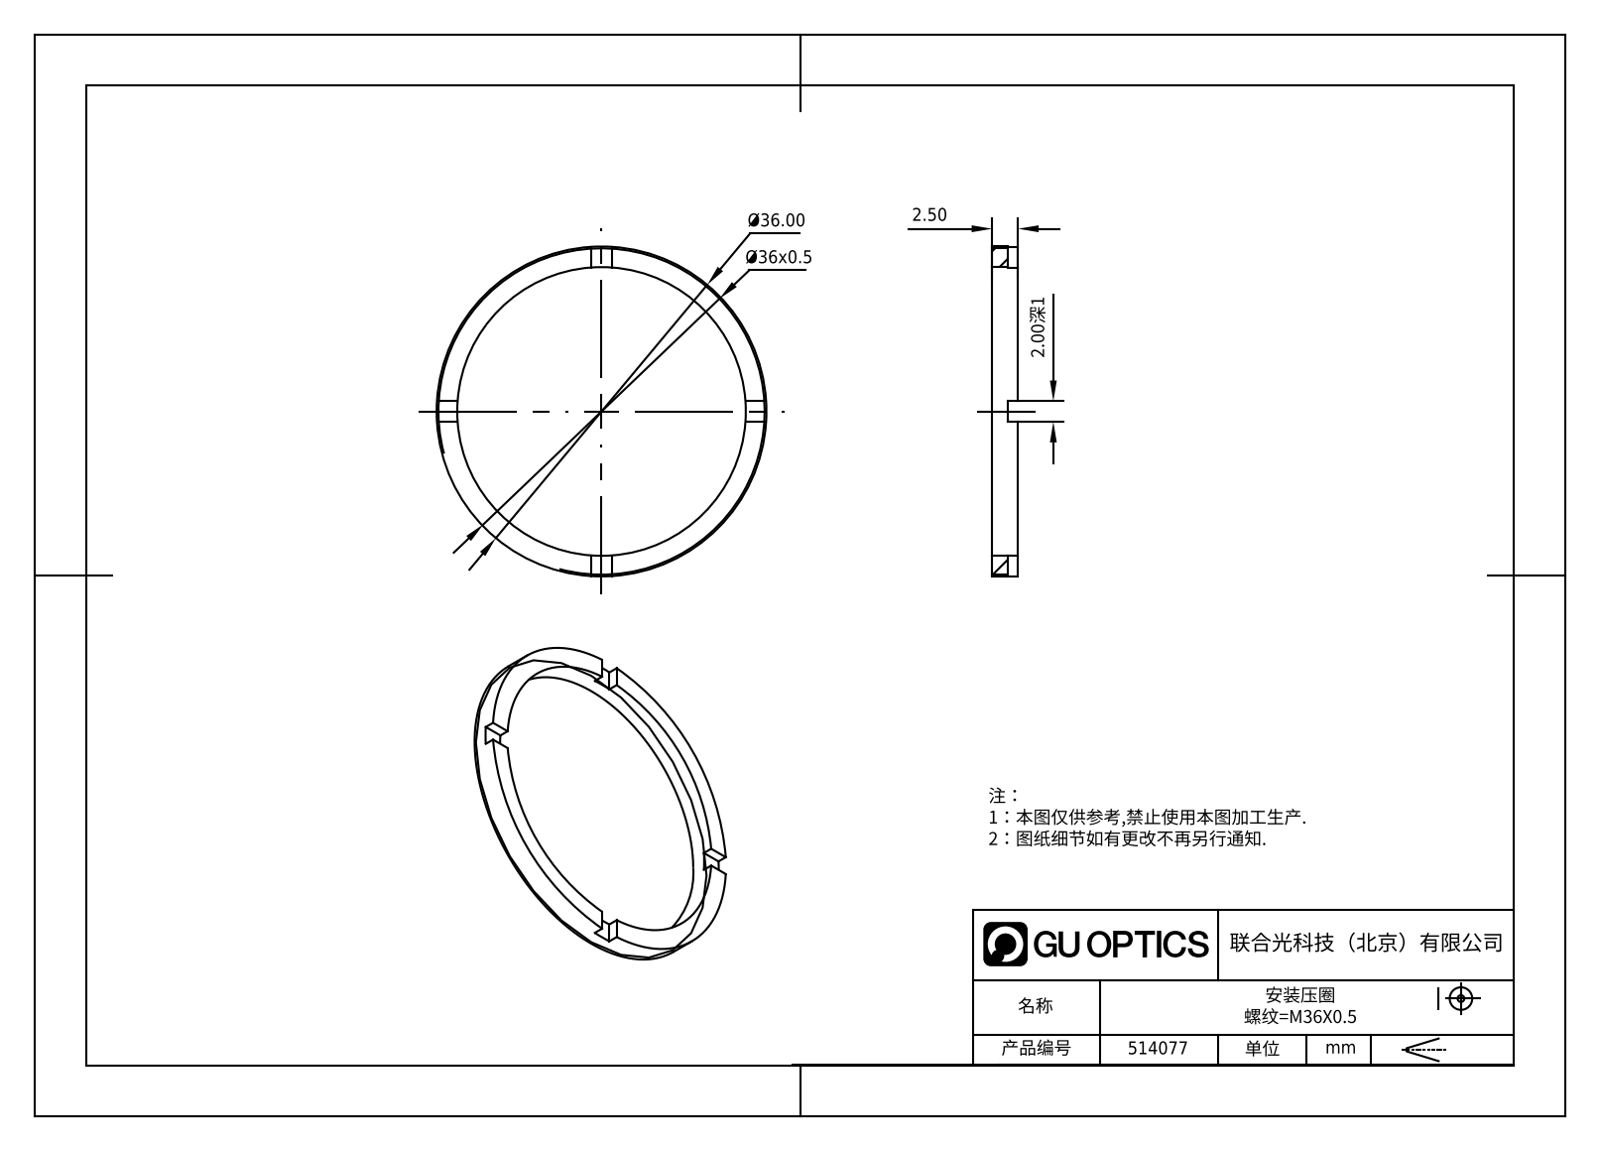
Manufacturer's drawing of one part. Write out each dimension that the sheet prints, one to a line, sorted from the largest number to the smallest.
Ø36.00
Ø36x0.5
2.50
2.00深1
